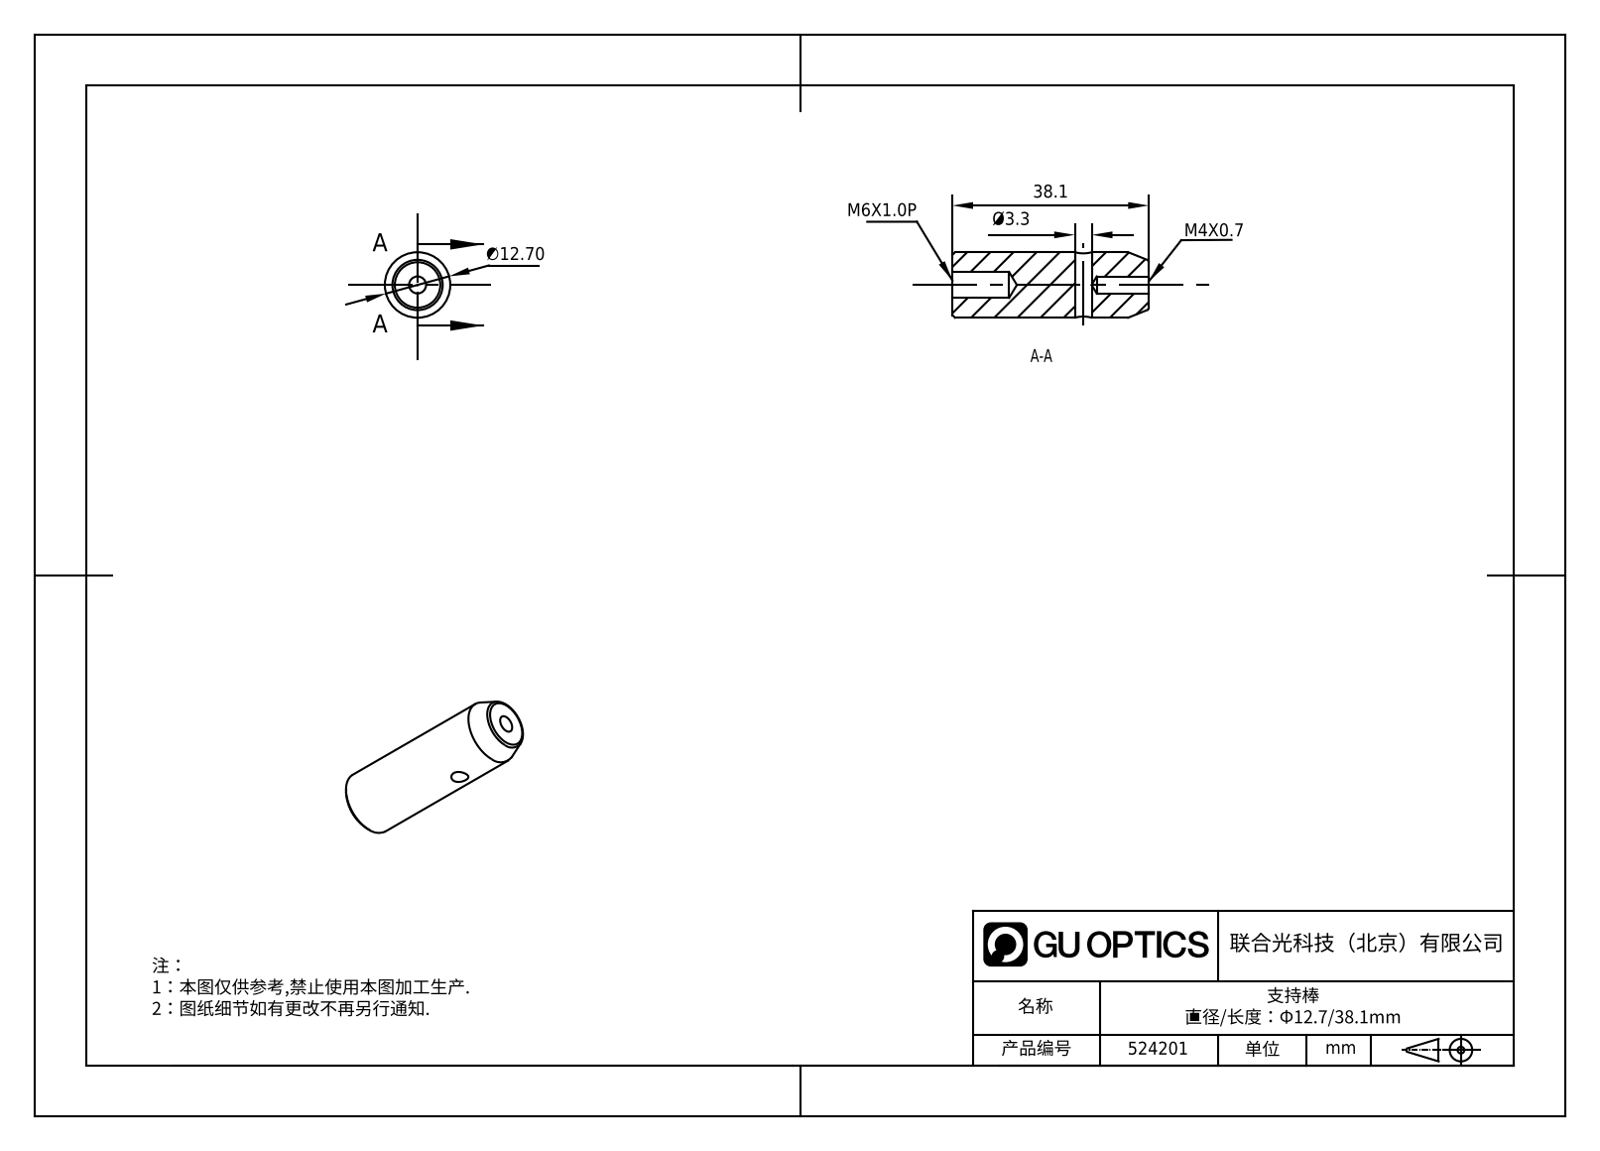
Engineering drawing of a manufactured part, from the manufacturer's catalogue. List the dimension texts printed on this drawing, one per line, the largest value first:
38.1
∅12.70
Ø3.3
